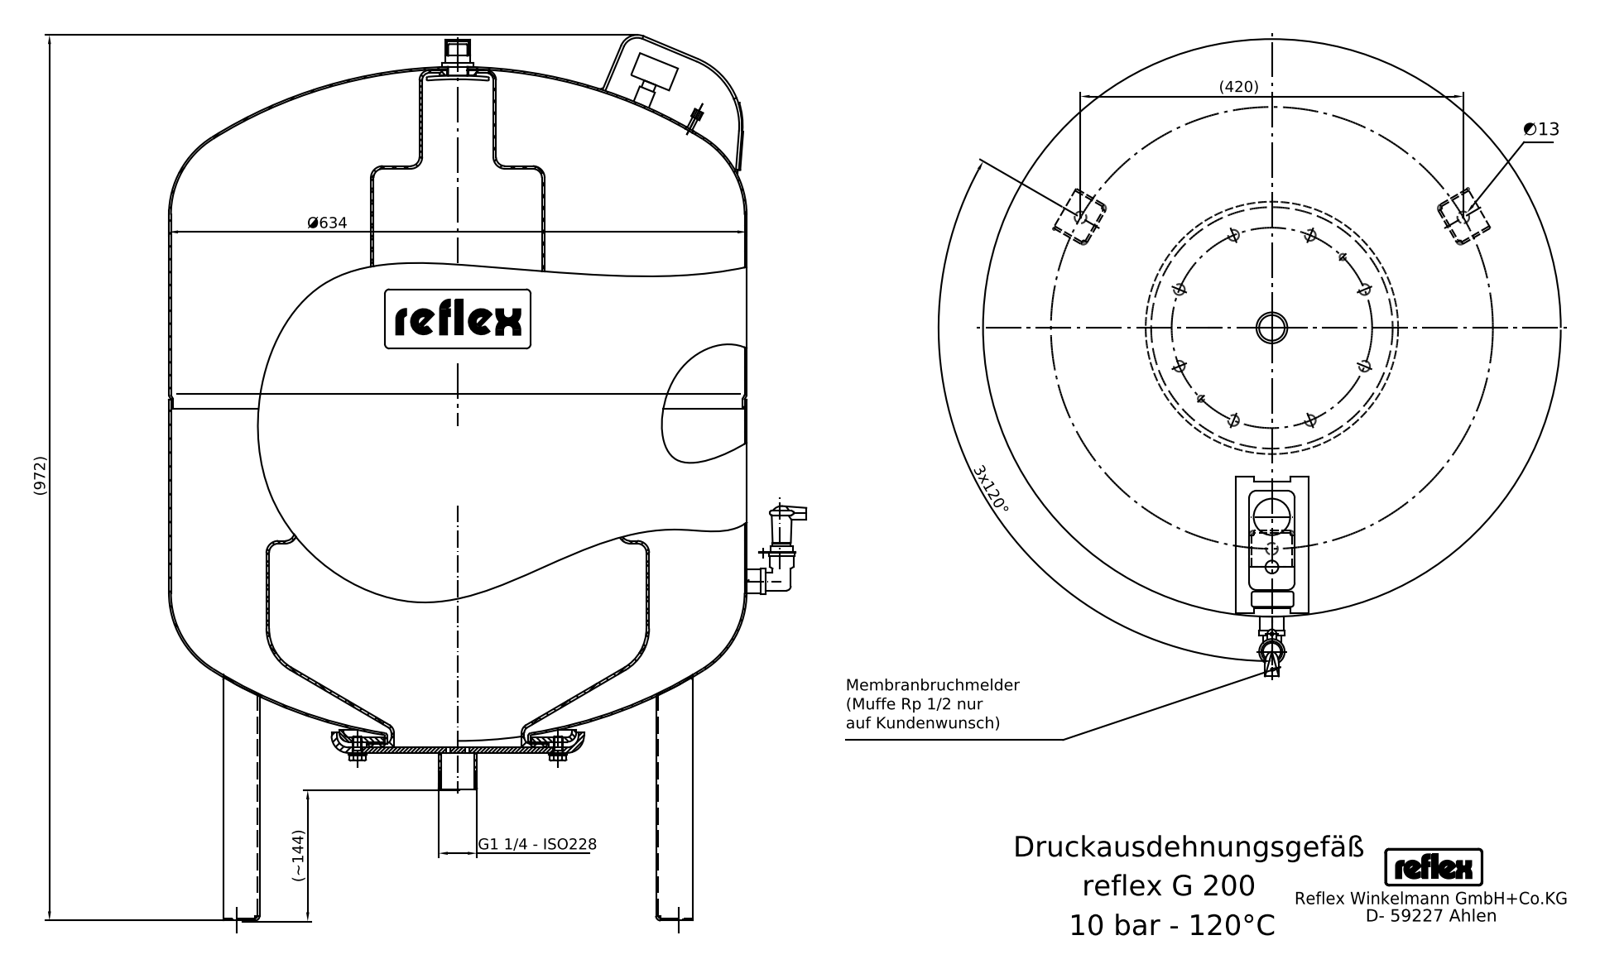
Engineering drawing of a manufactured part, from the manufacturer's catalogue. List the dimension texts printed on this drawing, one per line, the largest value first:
(972)
Ø634
(420)
(~144)
3x120°
∅13
G1 1/4 - ISO228
